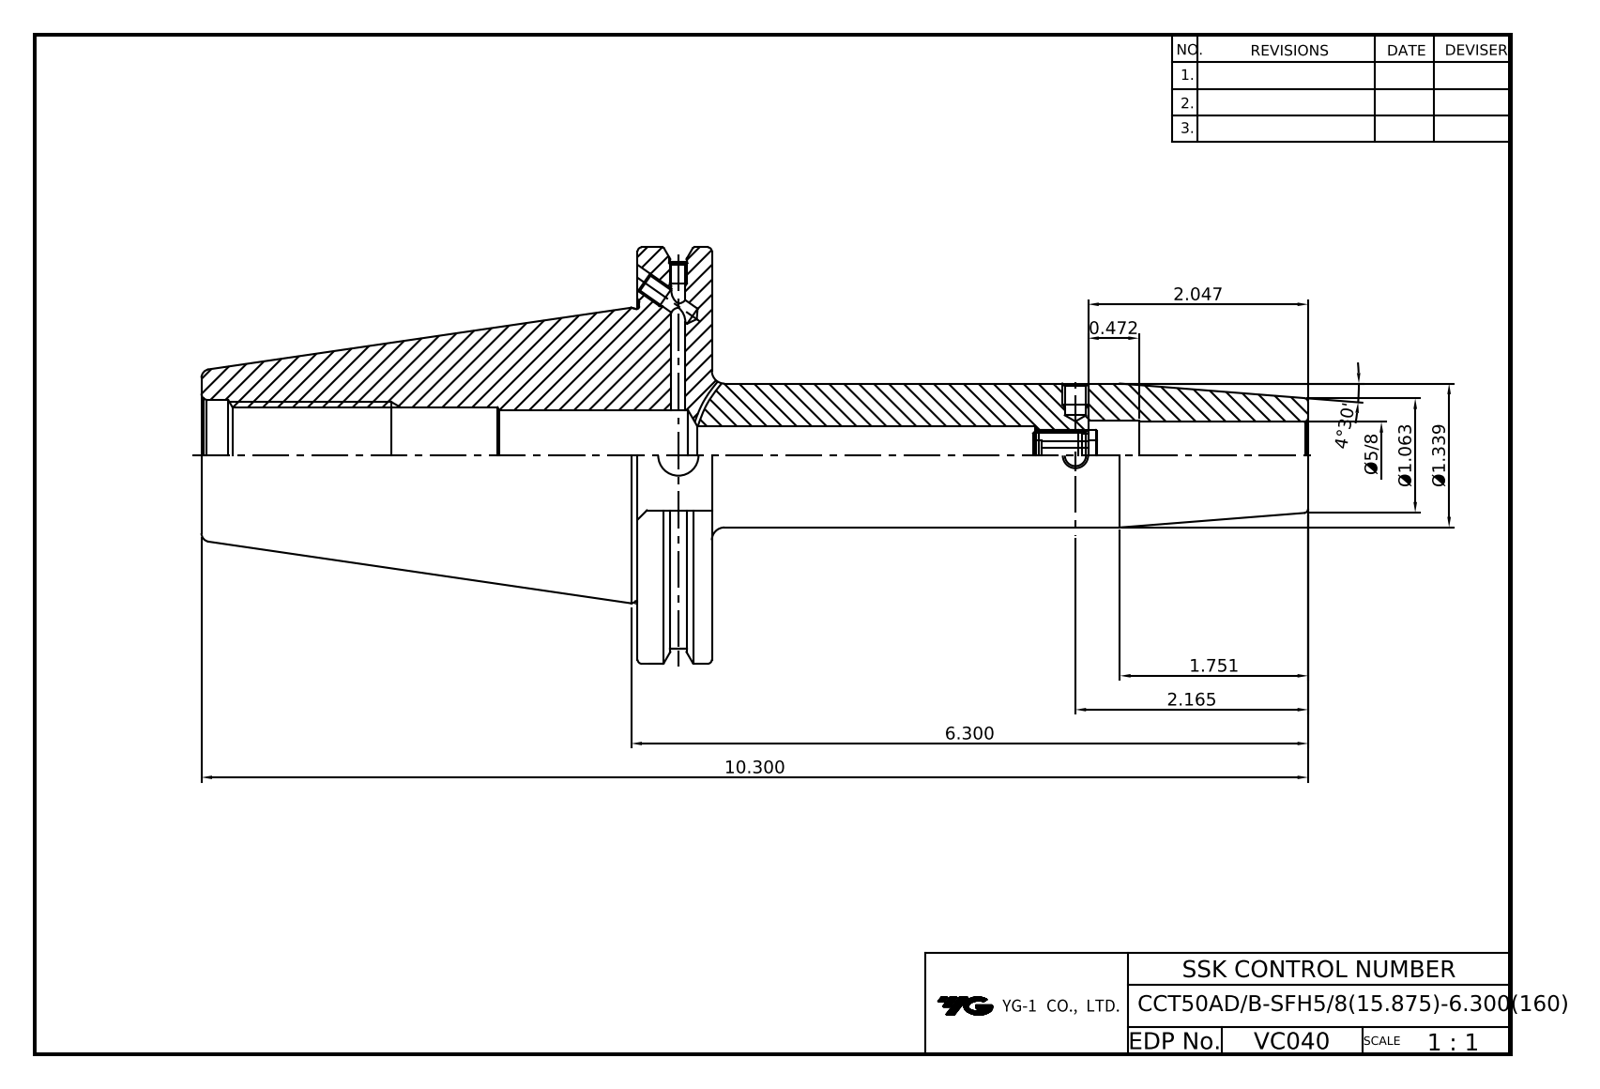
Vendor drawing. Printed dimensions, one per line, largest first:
10.300
6.300
4°30'
2.165
2.047
1.751
Ø1.339
Ø1.063
0.472
